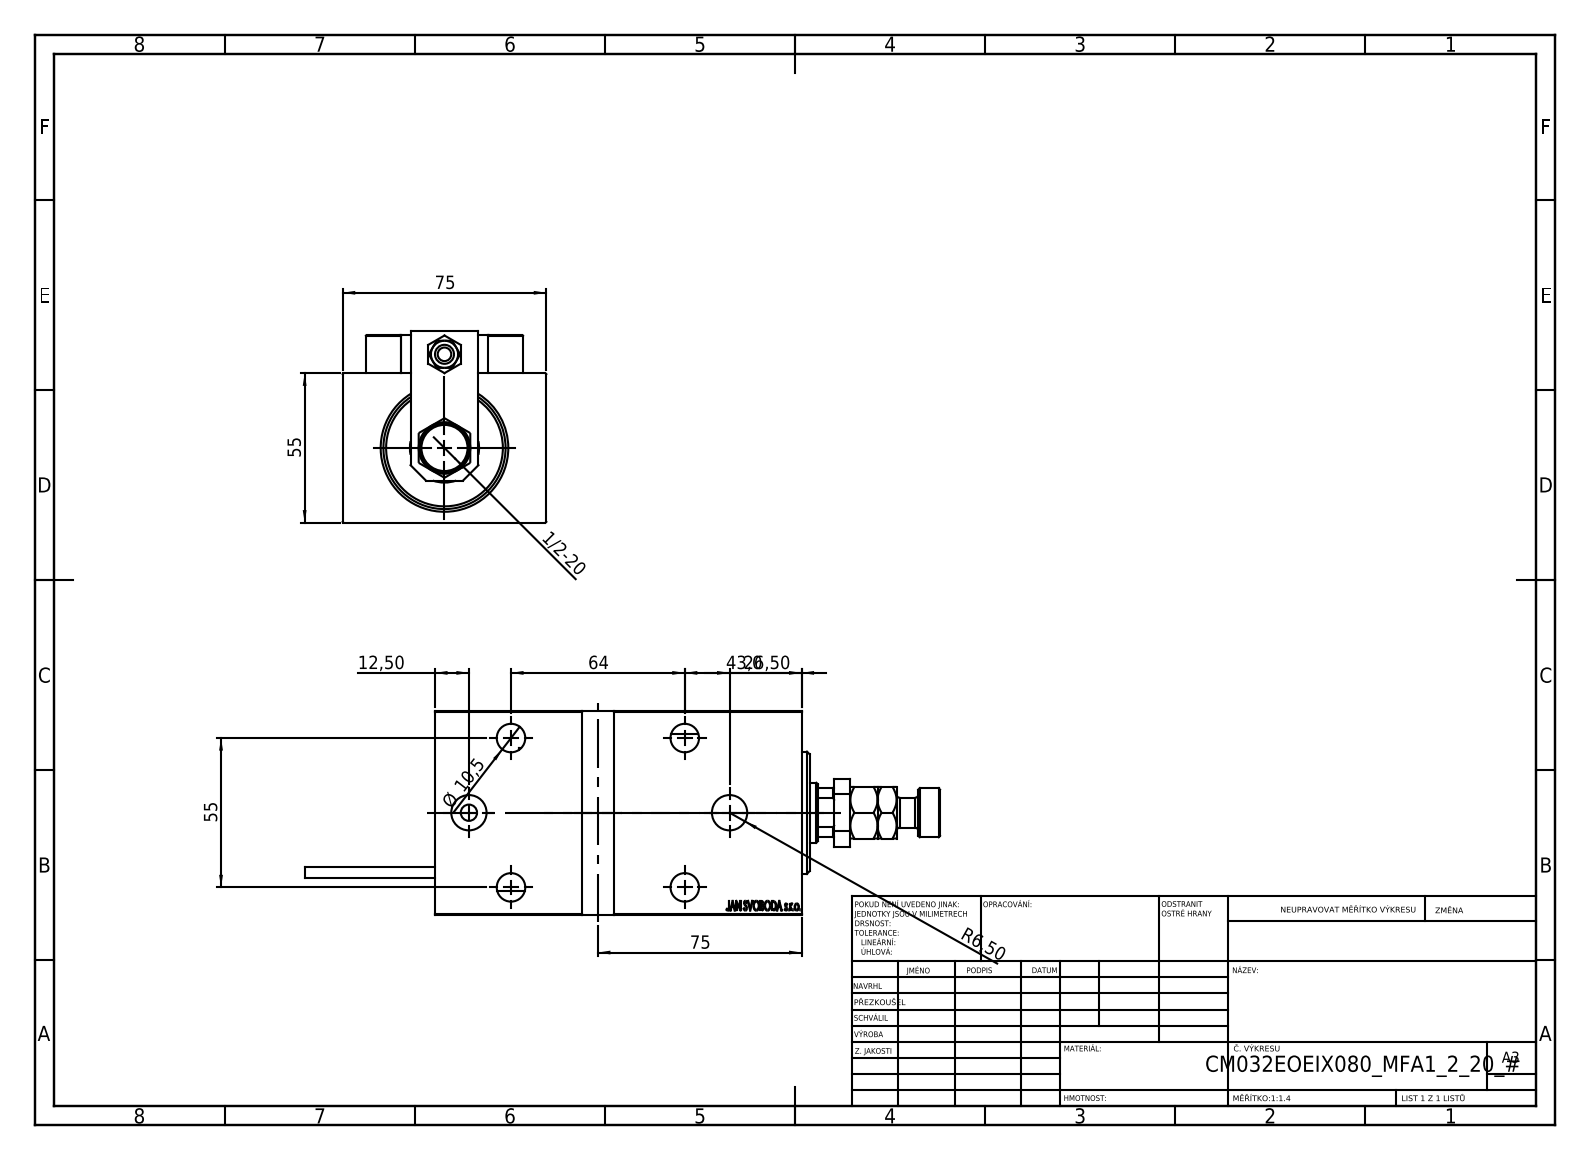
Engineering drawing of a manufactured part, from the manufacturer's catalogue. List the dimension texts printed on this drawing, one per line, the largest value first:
75
75
64
55
55
43,0
26,50
12,50
Ø 10,5
R6,50
1/2-20
